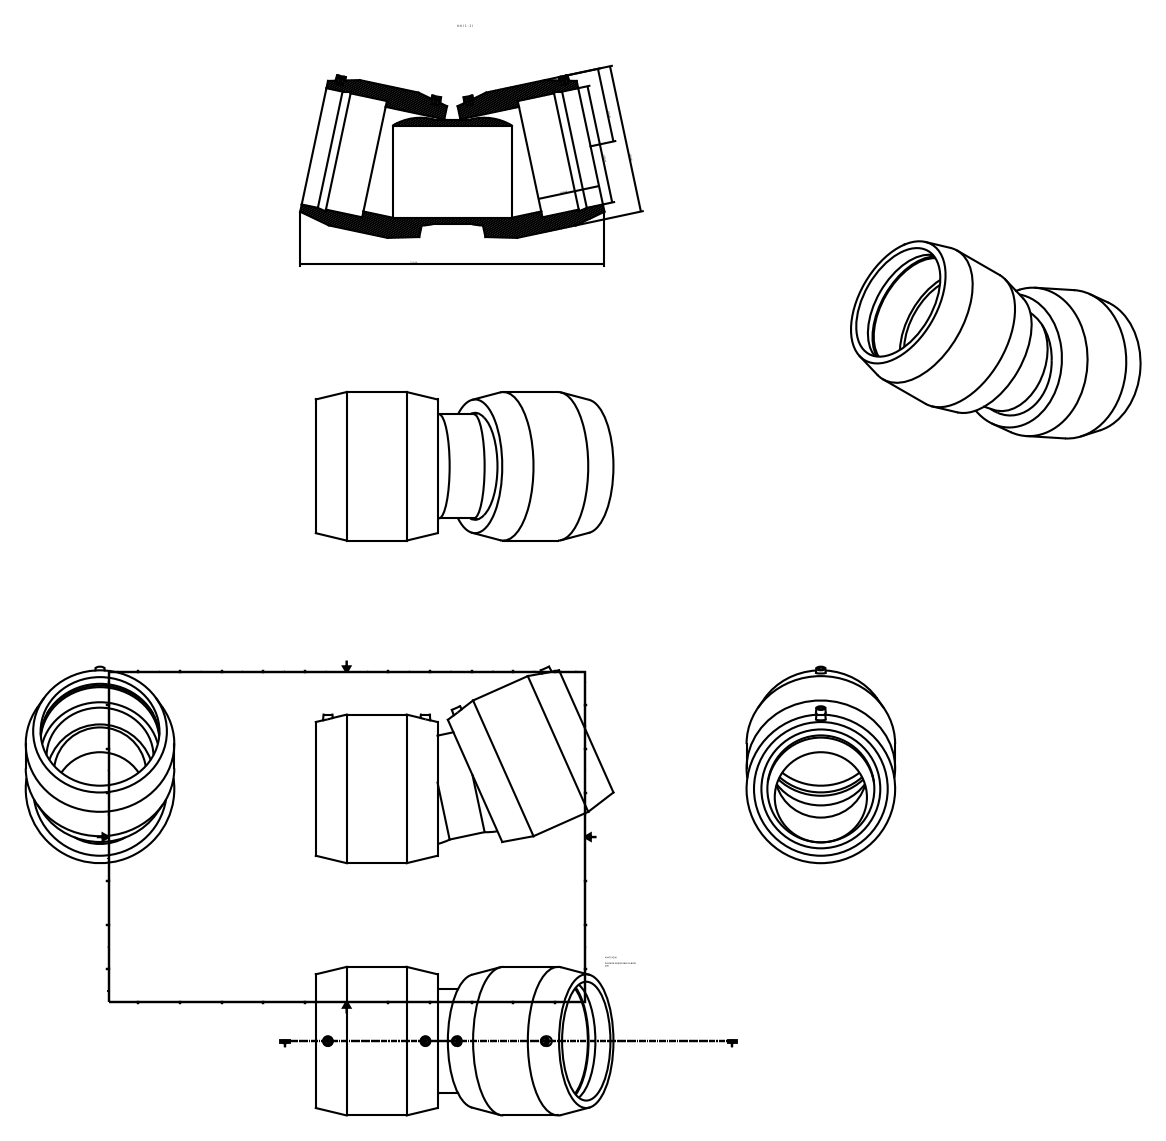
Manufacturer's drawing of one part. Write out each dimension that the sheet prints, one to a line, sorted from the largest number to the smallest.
512,00
250,00
n200,00
125,00
104,00
